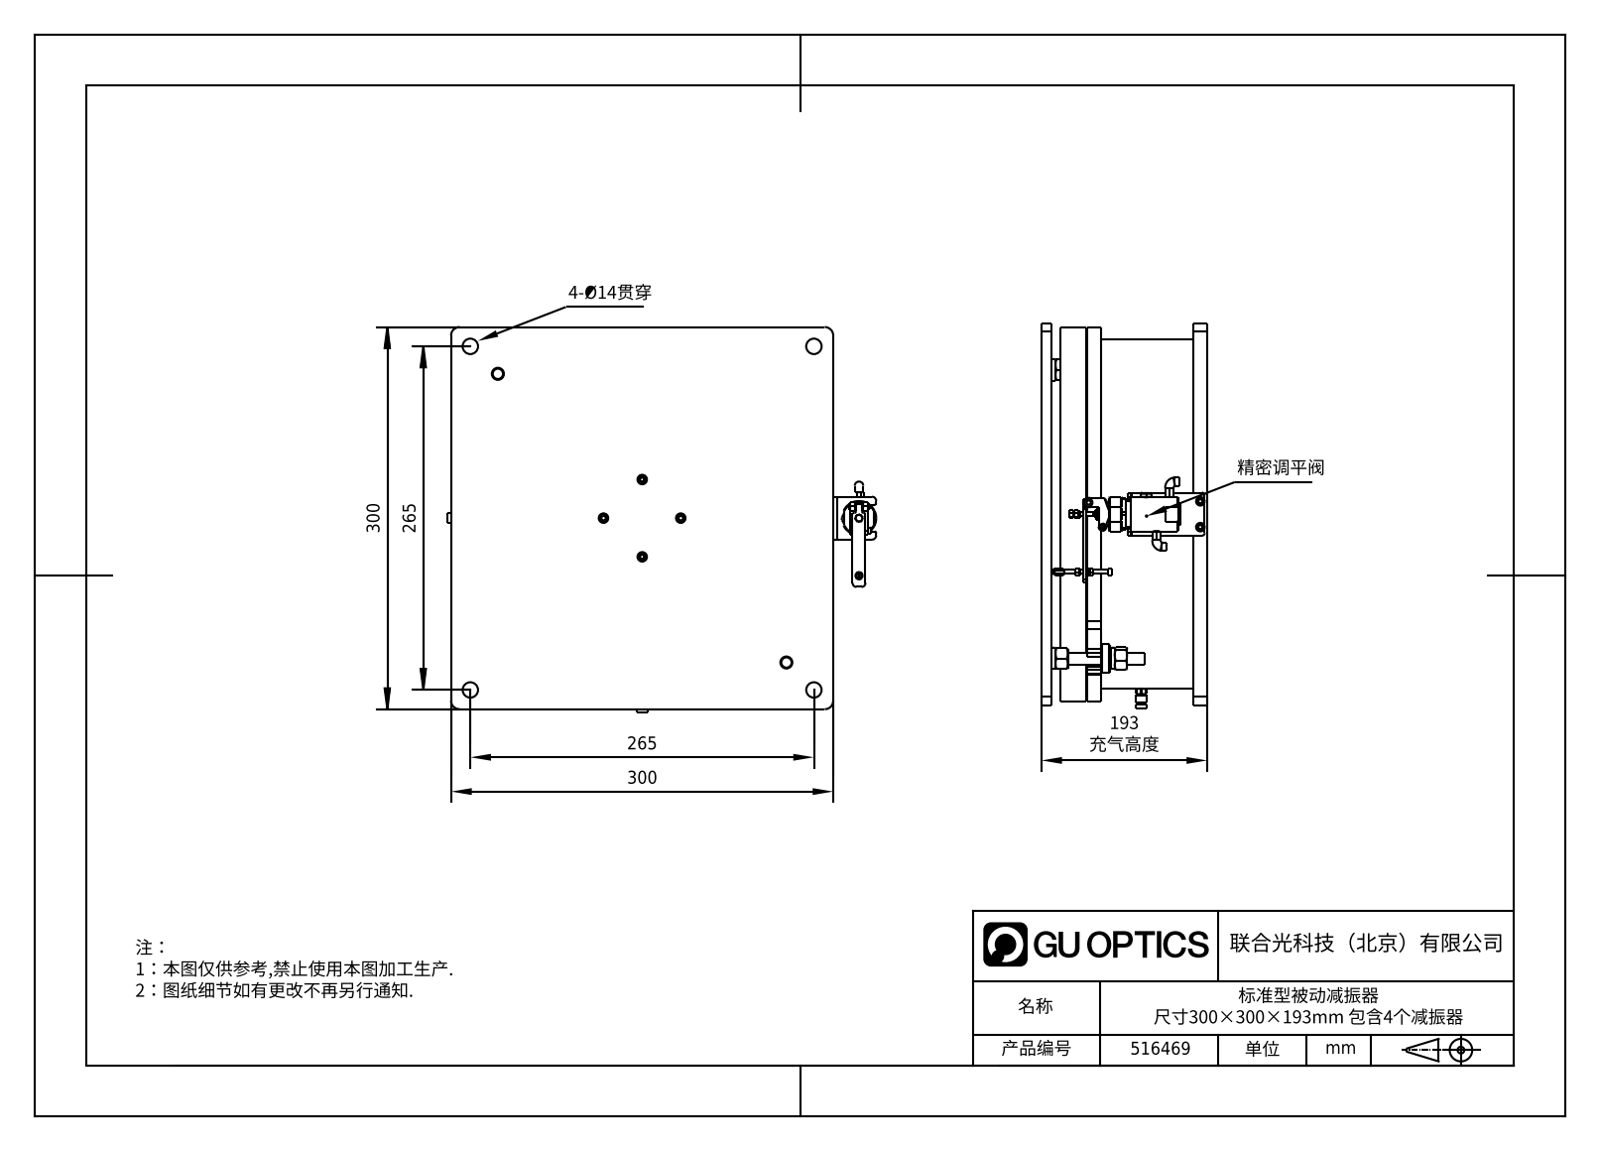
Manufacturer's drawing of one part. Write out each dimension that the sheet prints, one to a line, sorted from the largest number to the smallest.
300
300
265
265
193 充气高度
